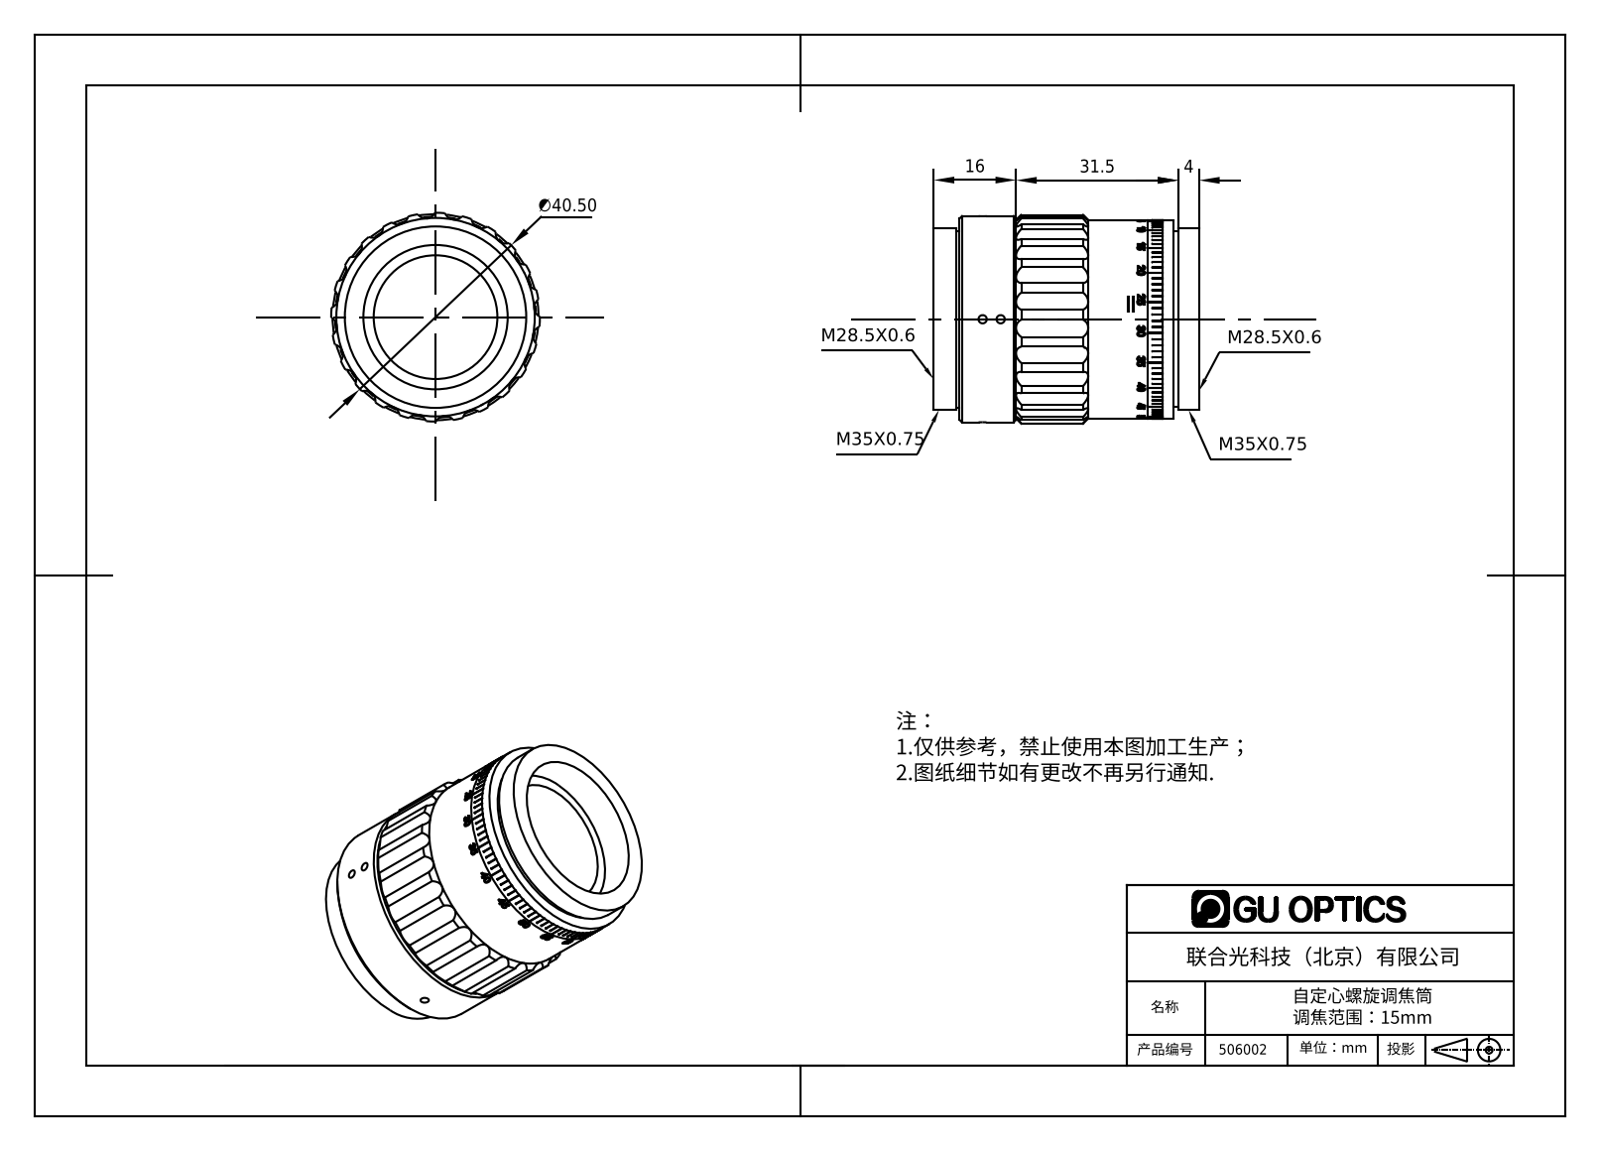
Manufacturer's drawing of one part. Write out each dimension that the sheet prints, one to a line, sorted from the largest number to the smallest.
∅40.50
31.5
16
4
